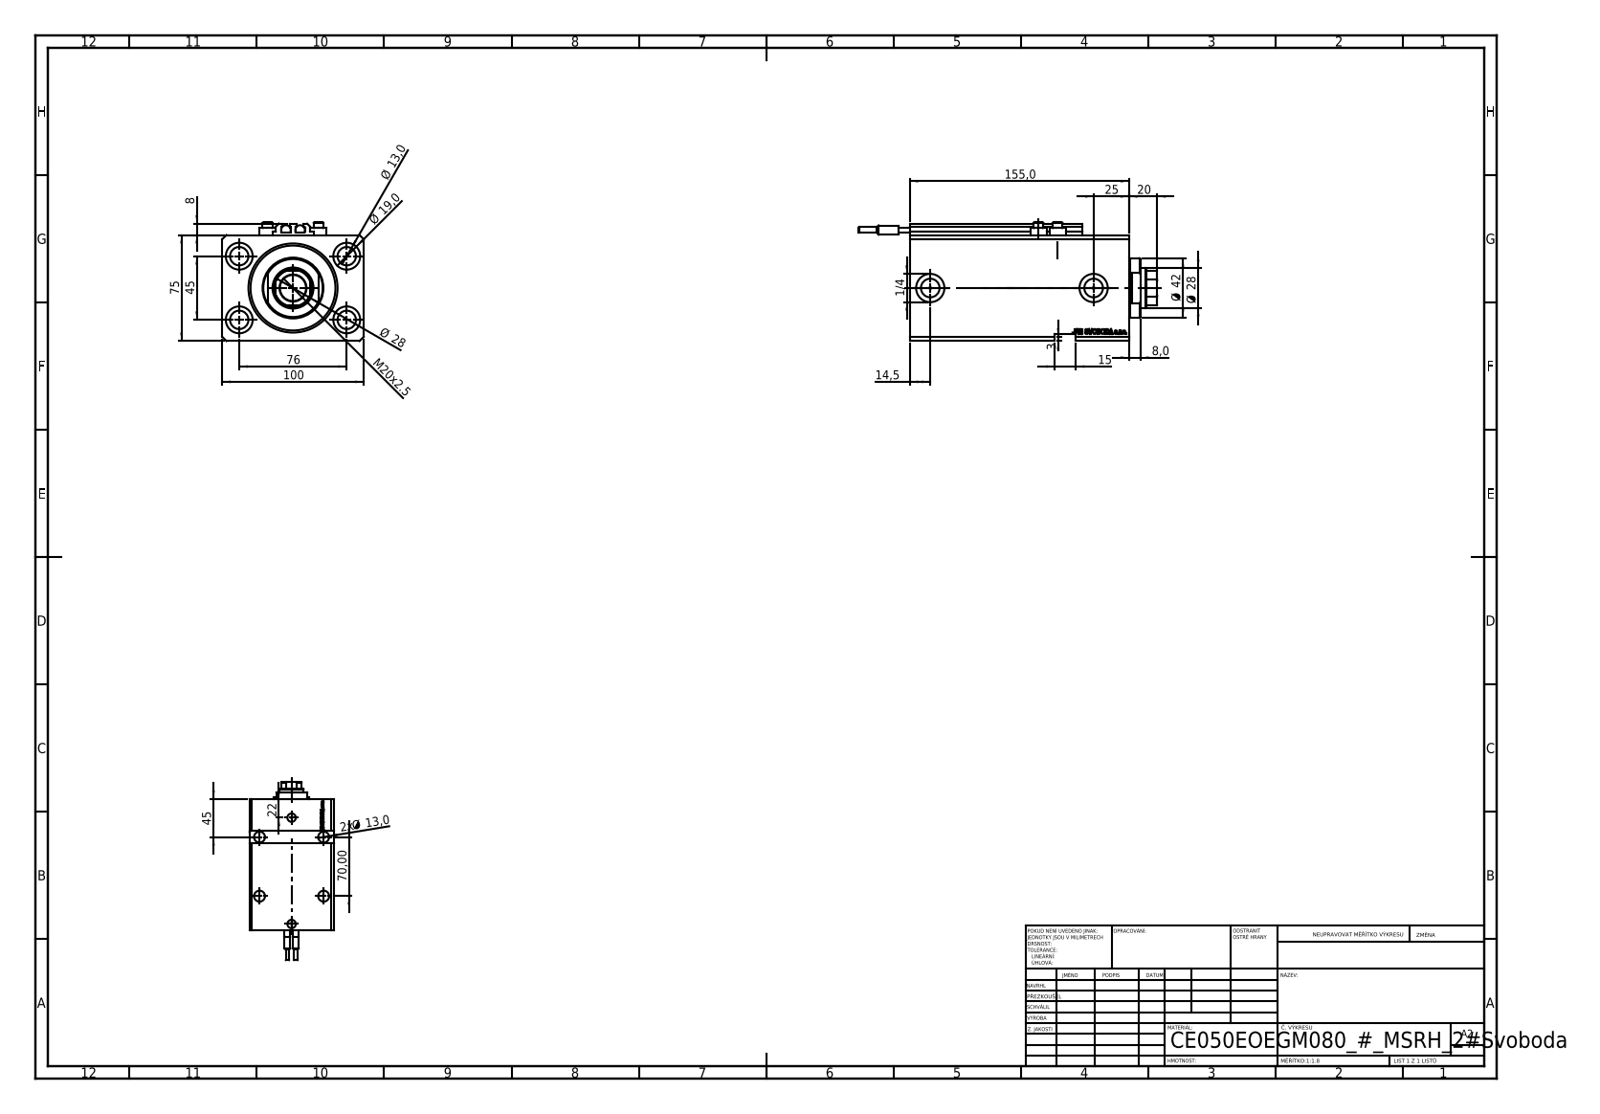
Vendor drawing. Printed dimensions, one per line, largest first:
155,0
100
76
75
70,00
45
45
Ø 42
Ø 28
Ø 28
25
22
M20x2.5
20
Ø 19,0
15
14,5
Ø 13,0
2x Ø 13,0
8
8,0
3
1/4
